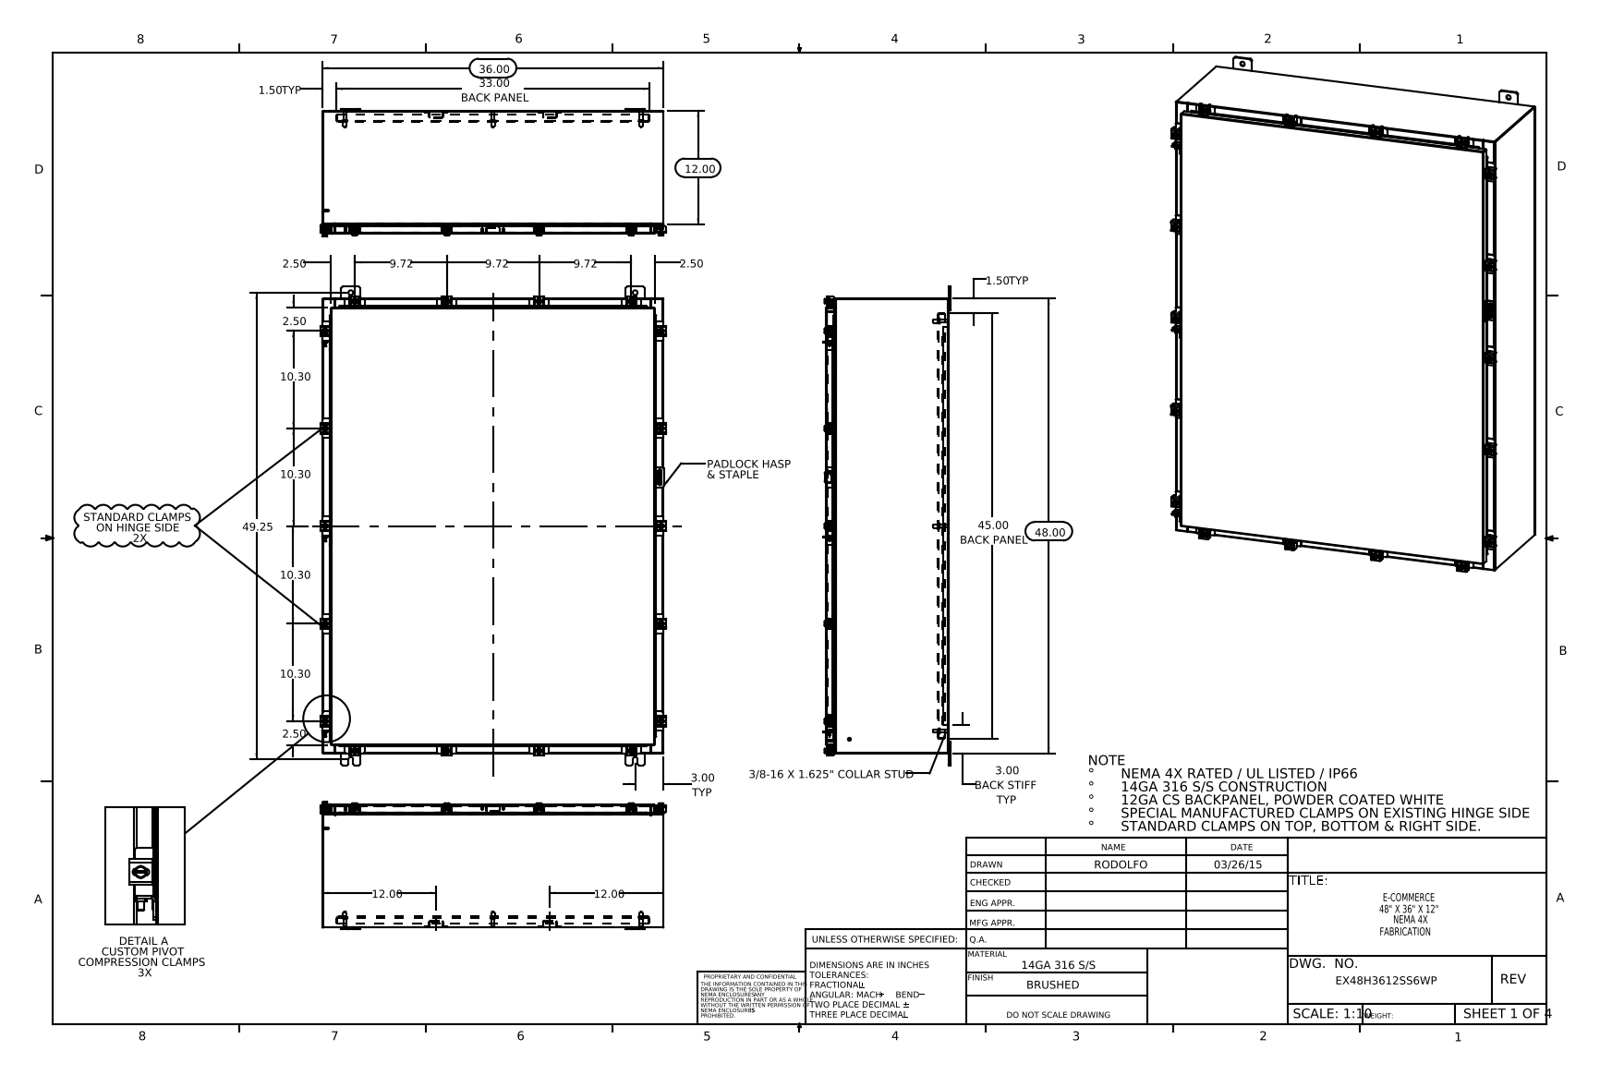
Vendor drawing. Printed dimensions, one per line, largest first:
49.25
48.00
45.00 BACK PANEL
36.00
33.00 BACK PANEL
12.00
12.00
12.00
10.30
10.30
10.30
10.30
9.72
9.72
9.72
3.00 TYP
3.00 BACK STIFF TYP
2.50
2.50
2.50
2.50
1.50 TYP
1.50 TYP
